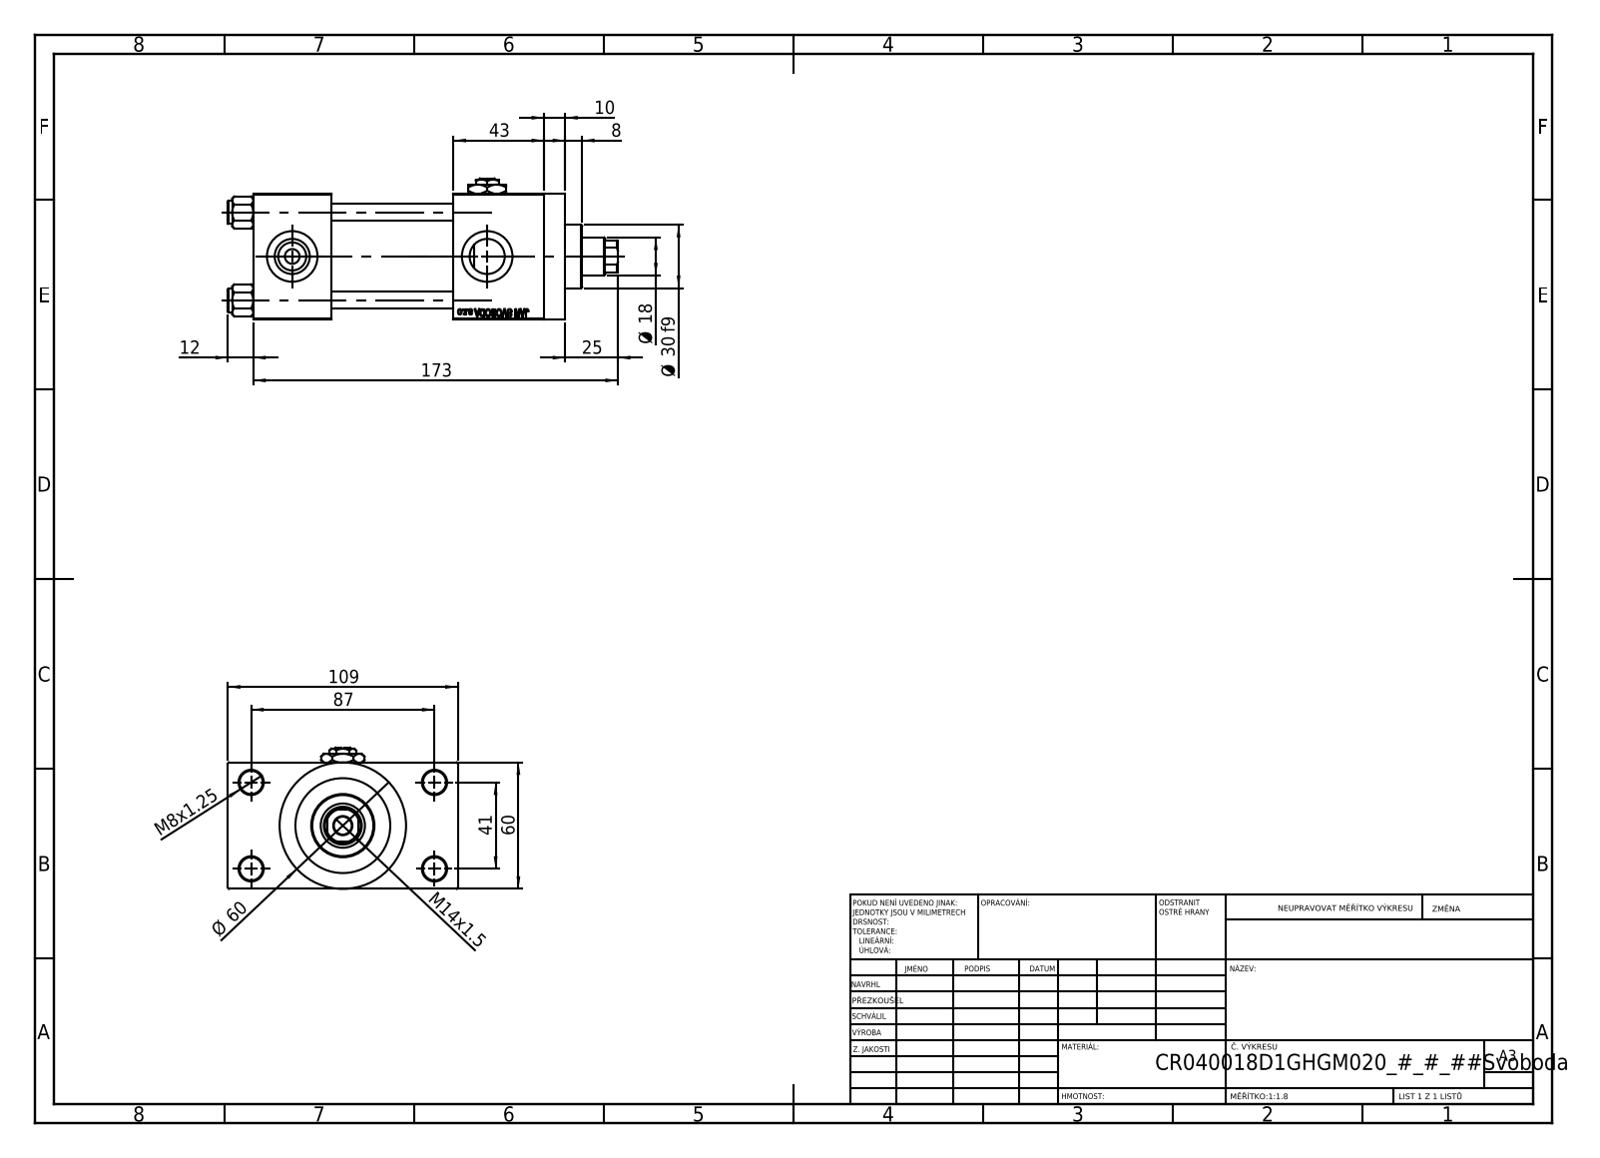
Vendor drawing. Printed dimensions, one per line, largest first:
173
109
87
Ø 60
60
43
41
Ø 30 f9
25
Ø 18
M14x1.5
12
10
8
M8x1.25
